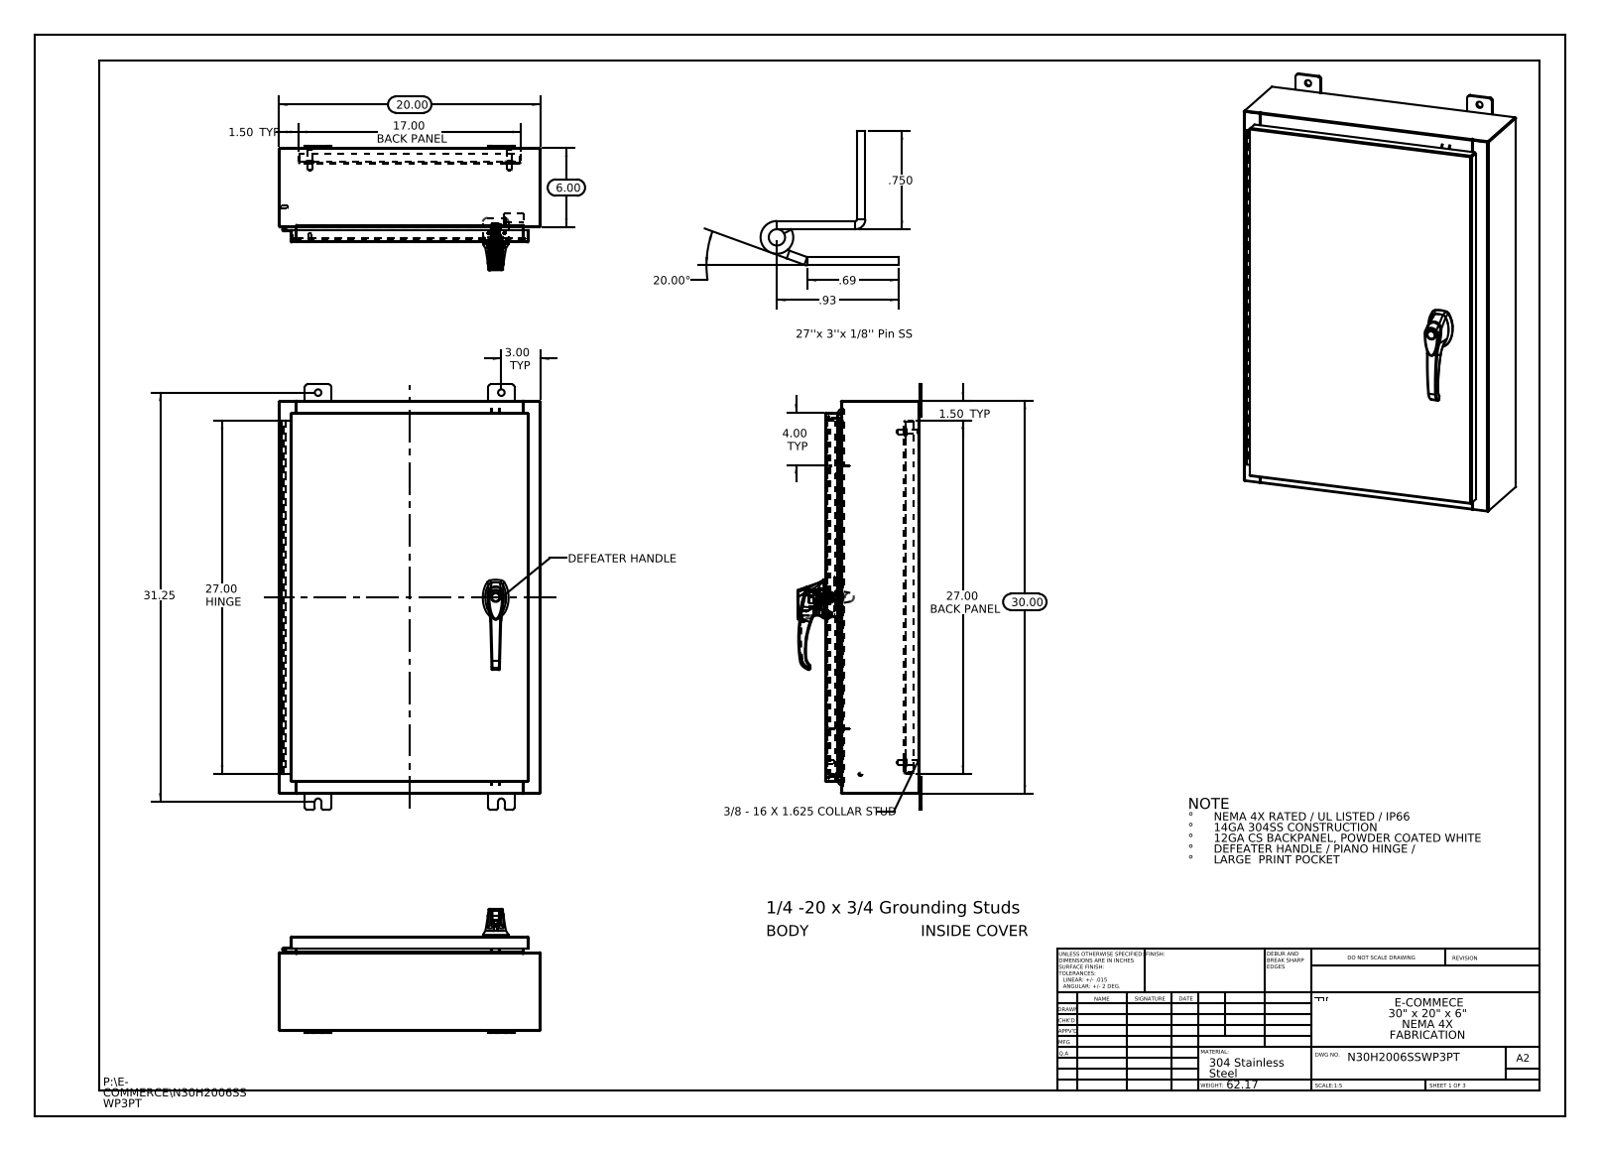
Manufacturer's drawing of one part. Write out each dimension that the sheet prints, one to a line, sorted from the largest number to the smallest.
31.25
30.00
27.00 HINGE
27.00 BACK PANEL
20.00
20.00°
17.00 BACK PANEL
6.00
4.00 TYP
3.00 TYP
1.50 TYP
1.50 TYP
.93
.750
.69
